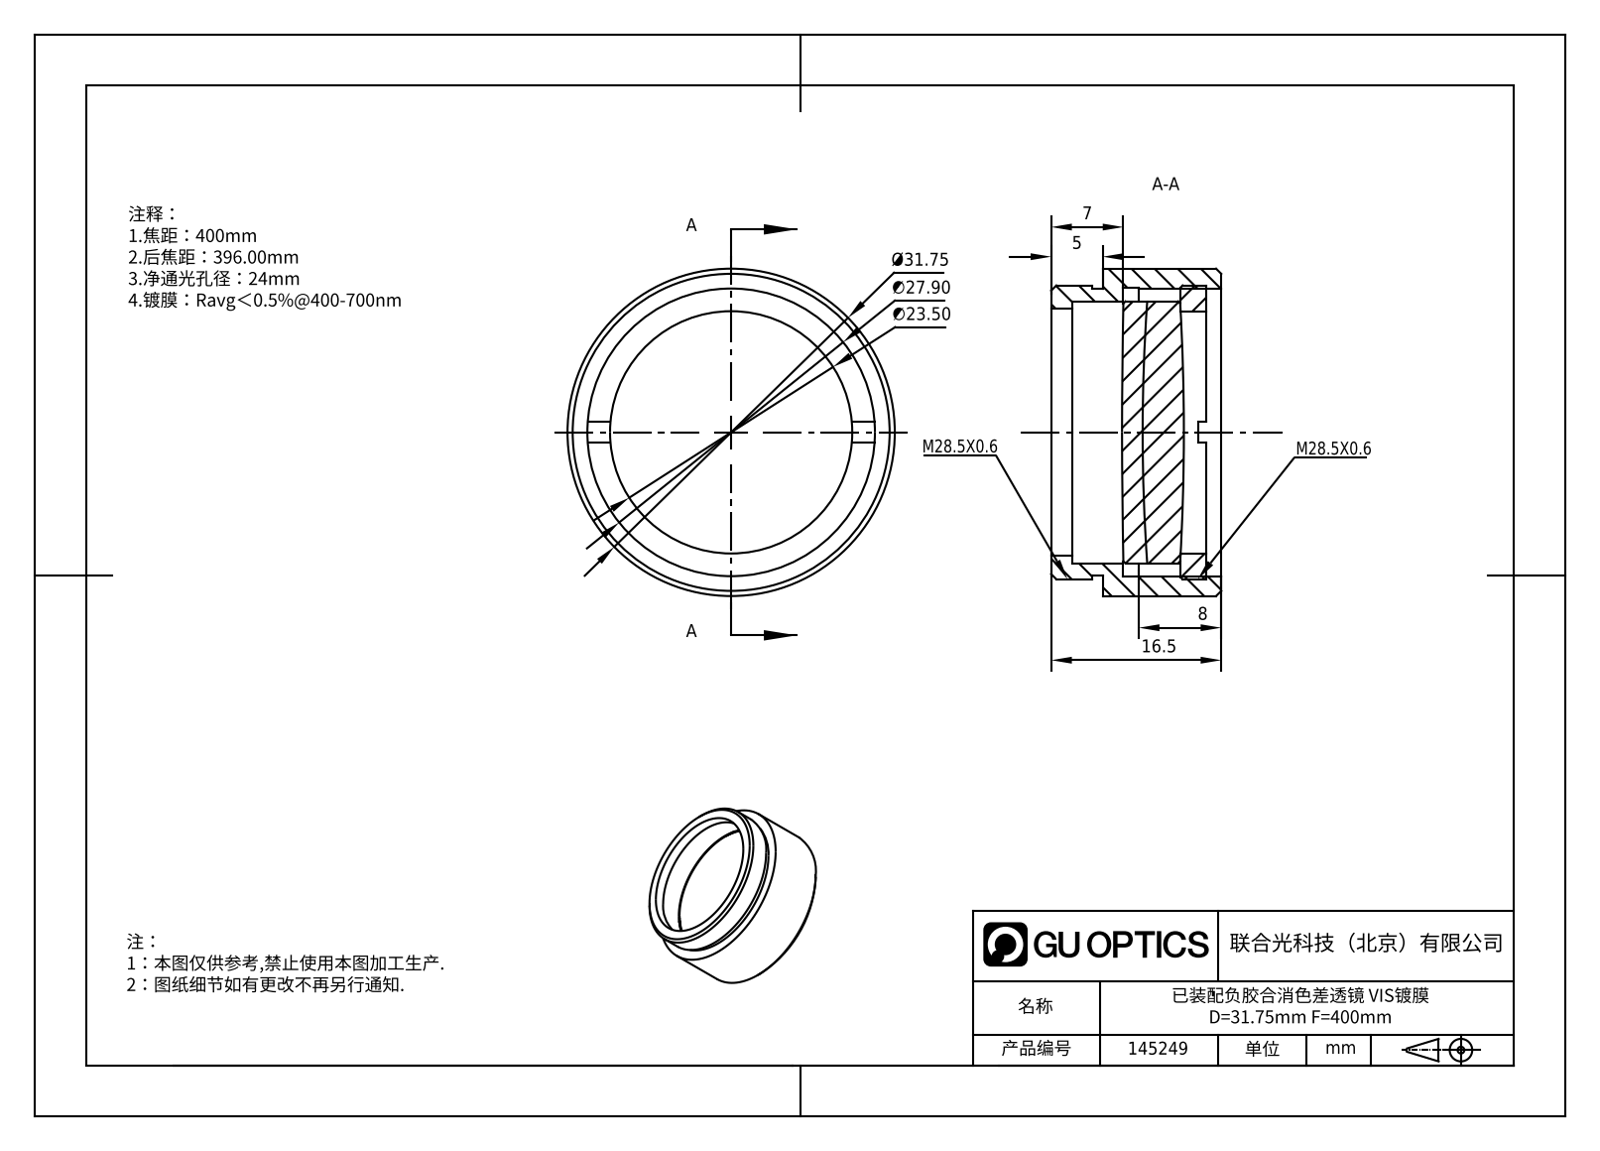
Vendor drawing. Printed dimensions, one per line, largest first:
Ø31.75
∅27.90
∅23.50
16.5
8
7
5
